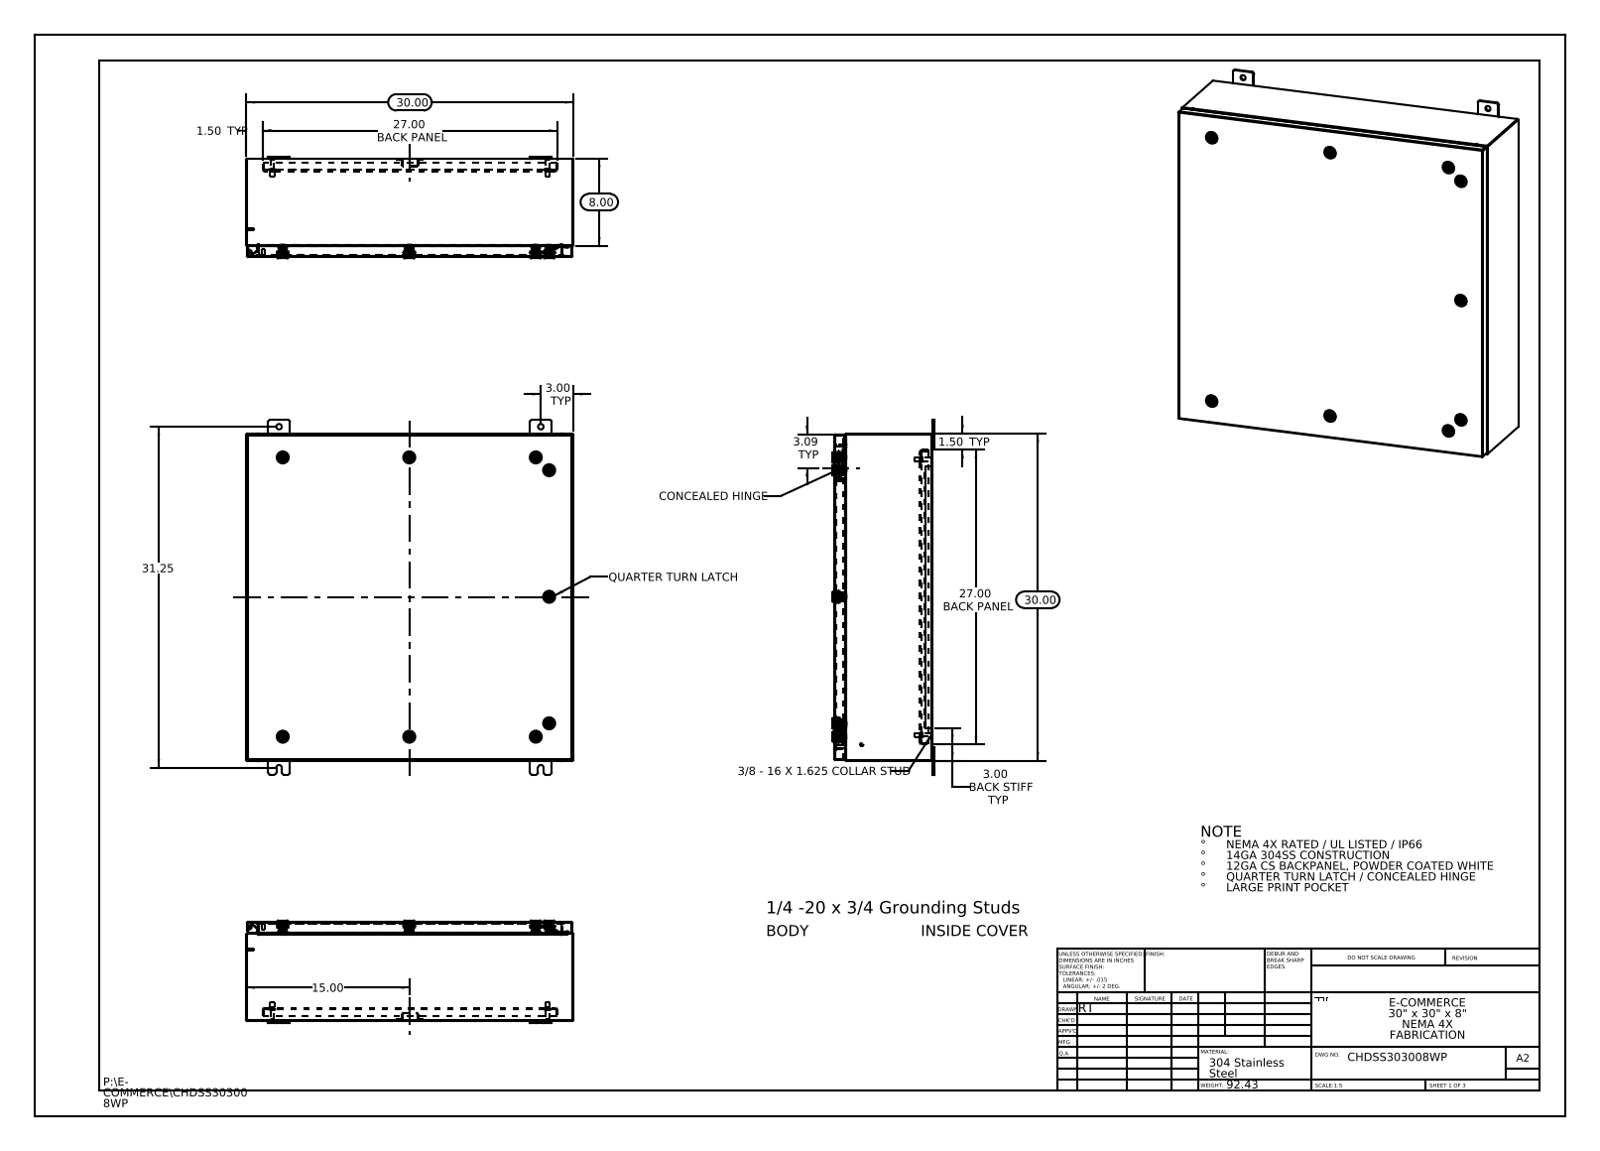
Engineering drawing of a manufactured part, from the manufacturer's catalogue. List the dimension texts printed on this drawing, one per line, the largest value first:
31.25
30.00
30.00
27.00 BACK PANEL
27.00 BACK PANEL
15.00
8.00
3.09 TYP
3.00 TYP
3.00 BACK STIFF TYP
1.50 TYP
1.50 TYP
